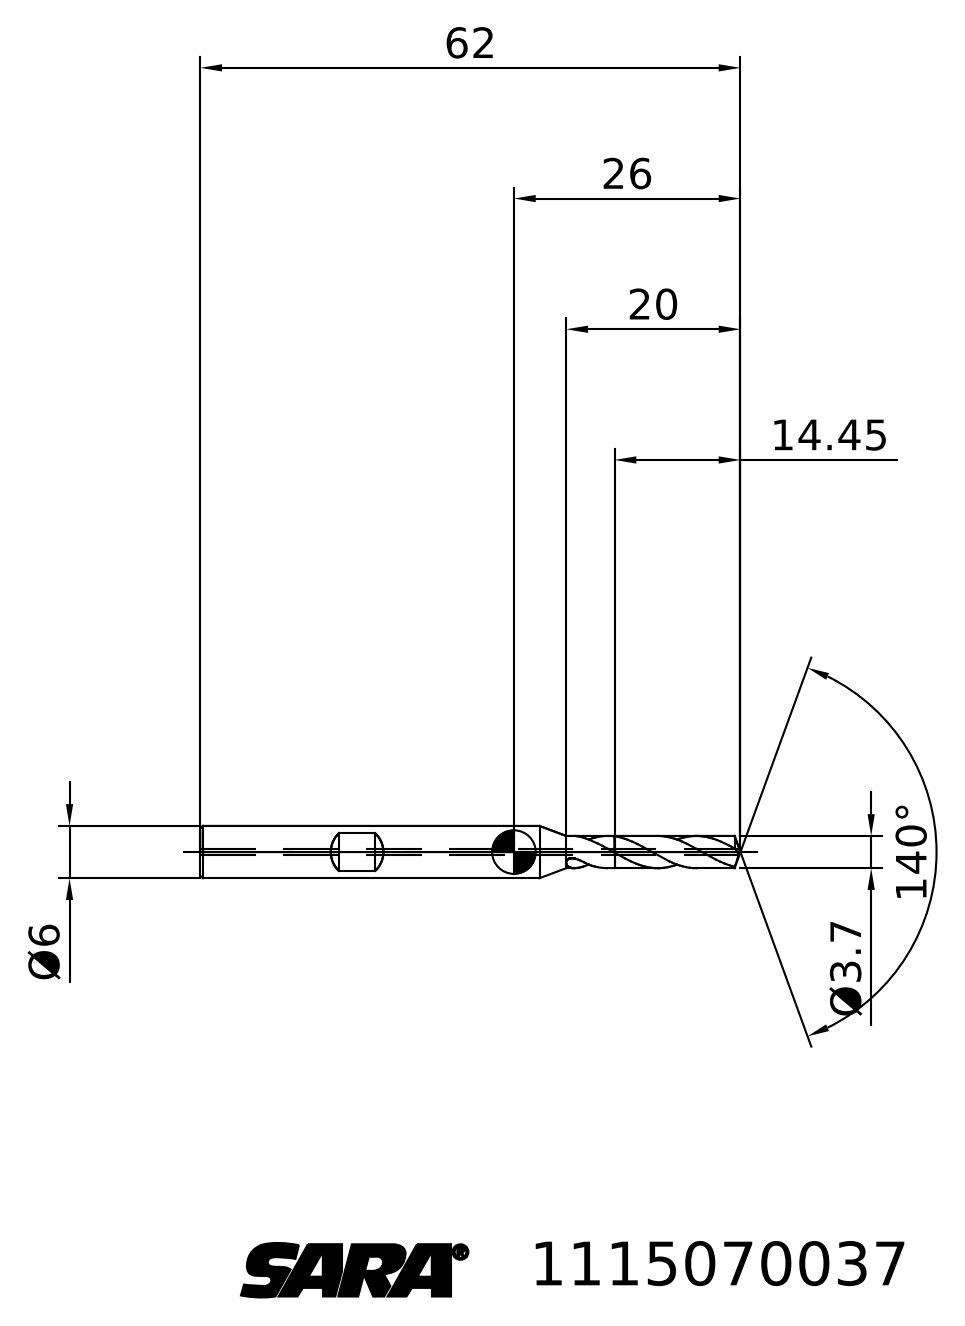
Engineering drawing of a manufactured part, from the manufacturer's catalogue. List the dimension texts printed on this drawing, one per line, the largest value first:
140°
62
26
20
14.45
Ø6
Ø3.7
